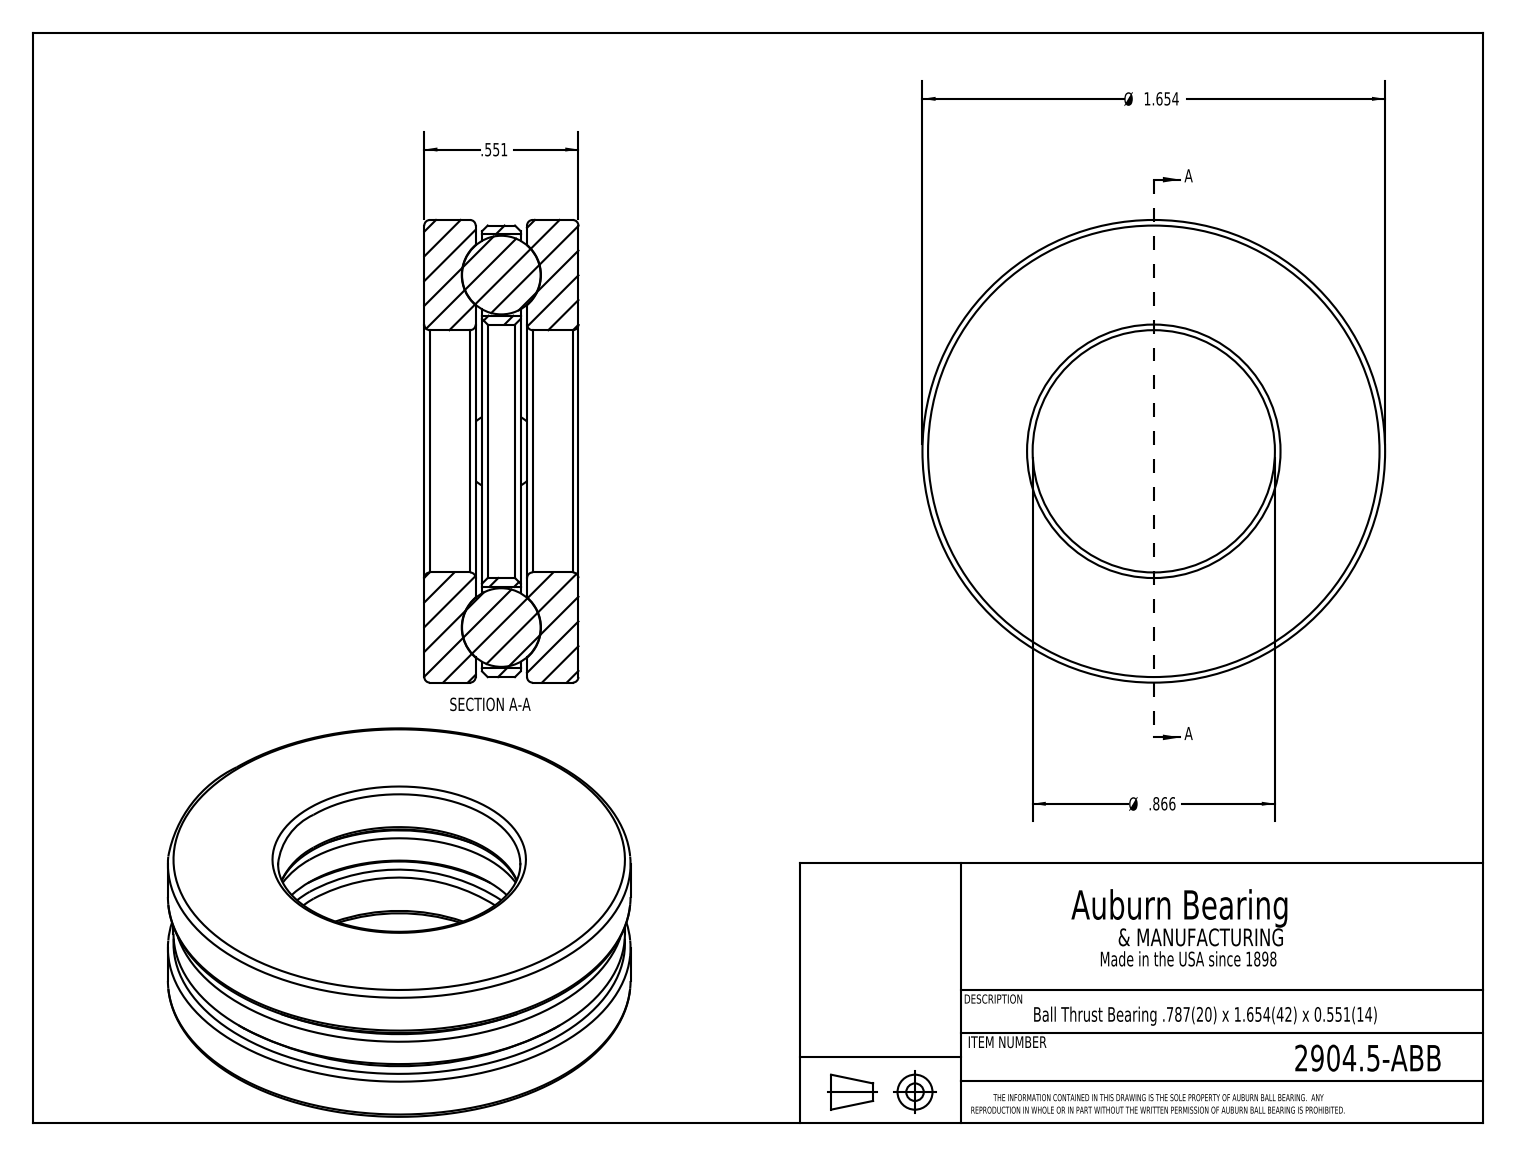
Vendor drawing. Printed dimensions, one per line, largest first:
Ø 1.654
Ø .866
.551
